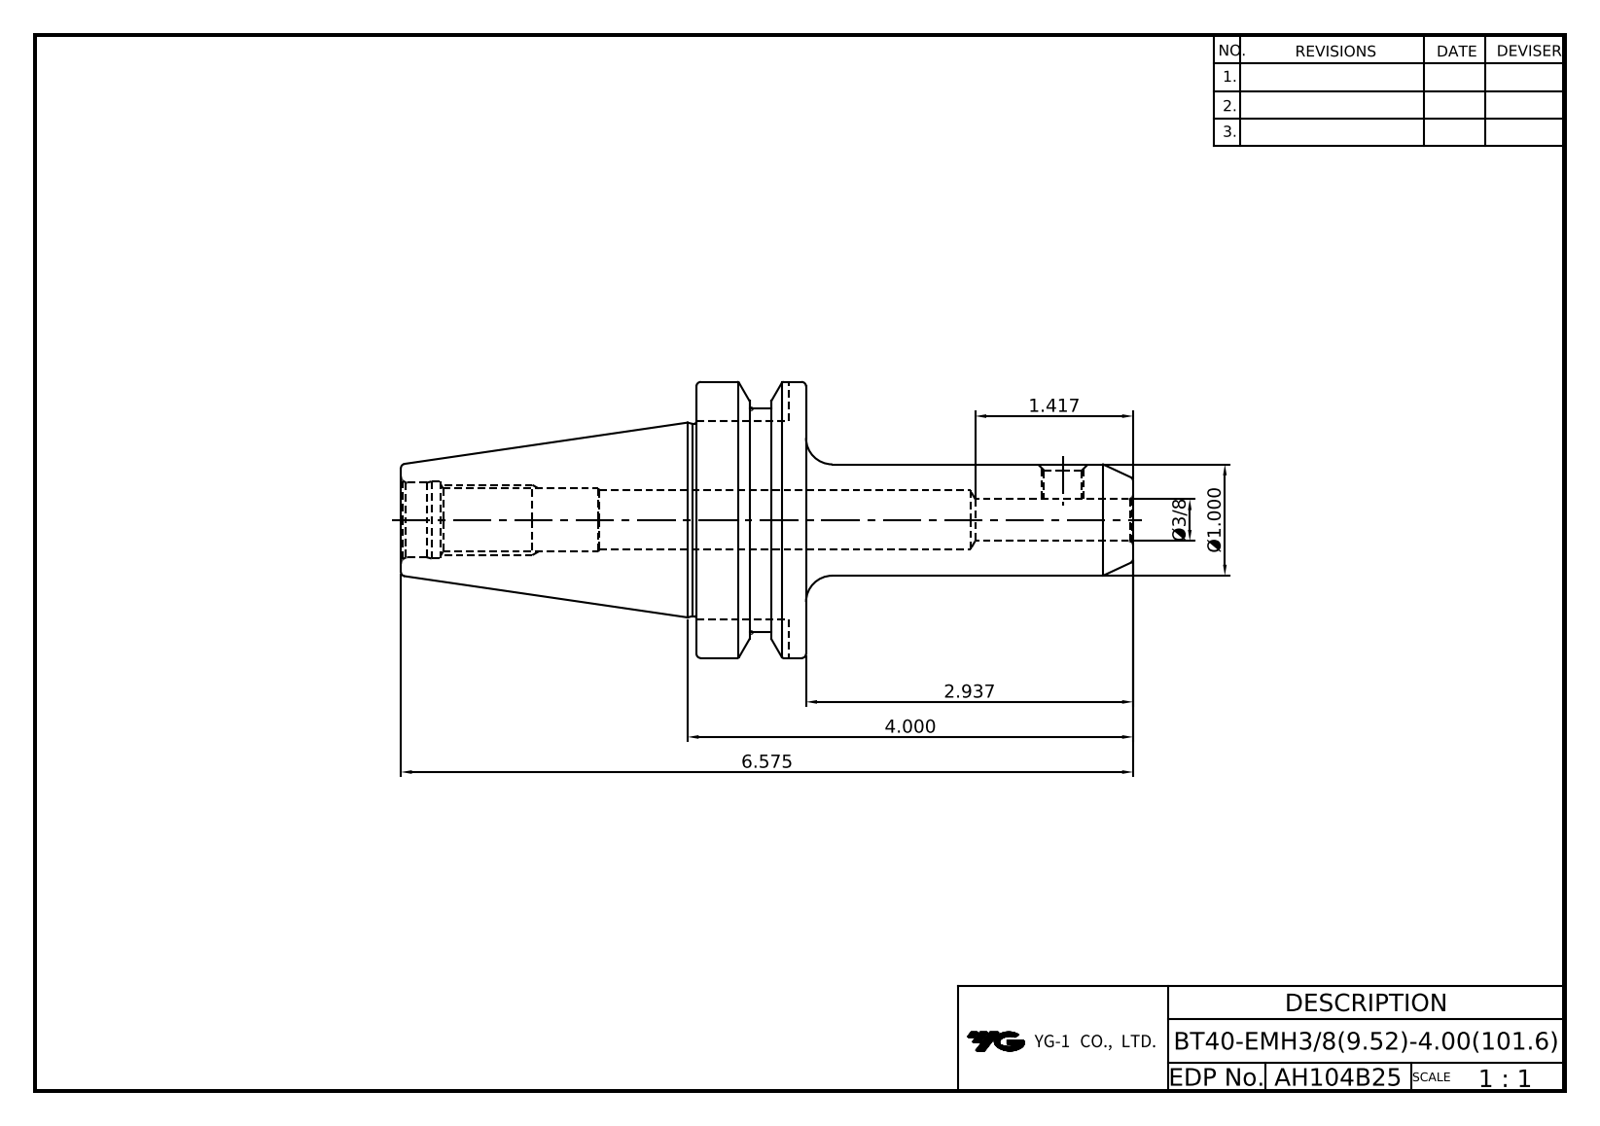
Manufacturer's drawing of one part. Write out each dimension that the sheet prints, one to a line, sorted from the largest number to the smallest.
6.575
4.000
2.937
1.417
Ø1.000
Ø3/8
